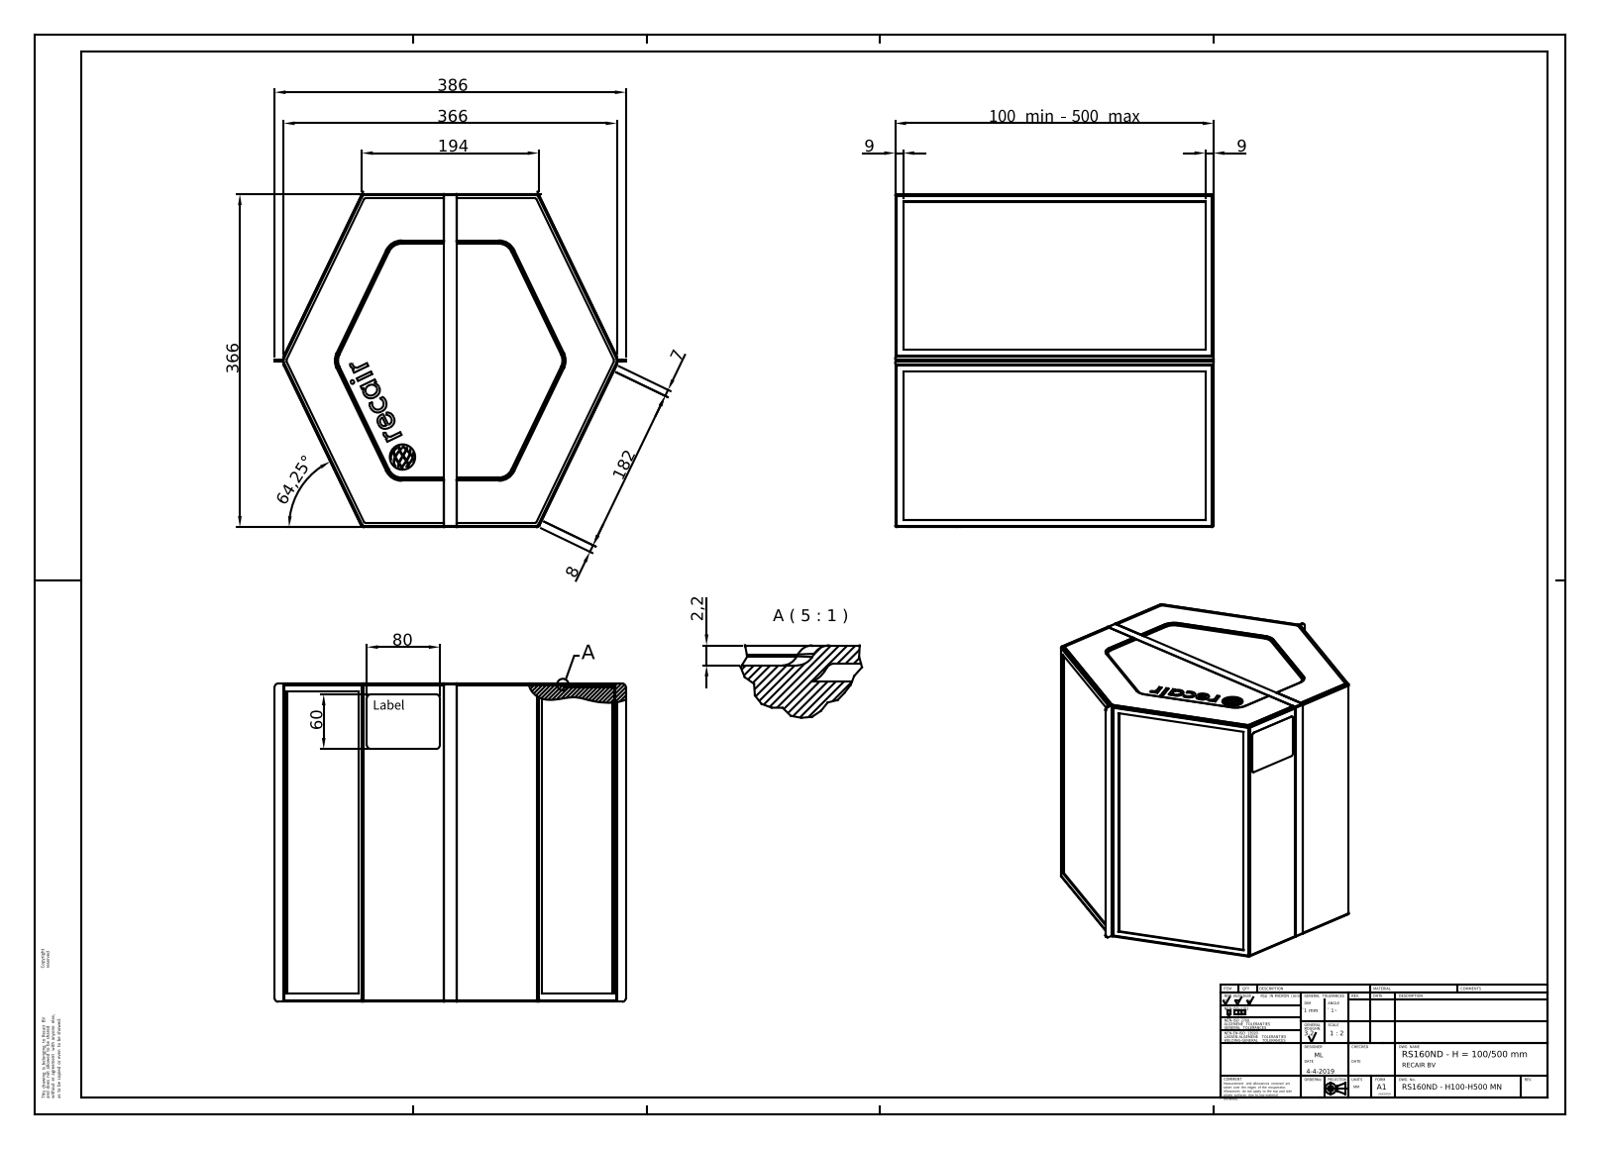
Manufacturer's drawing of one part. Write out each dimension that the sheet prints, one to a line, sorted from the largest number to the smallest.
386
366
366
194
182
100 min - 500 max
80
64,25°
60
9
9
8
7
2,2
